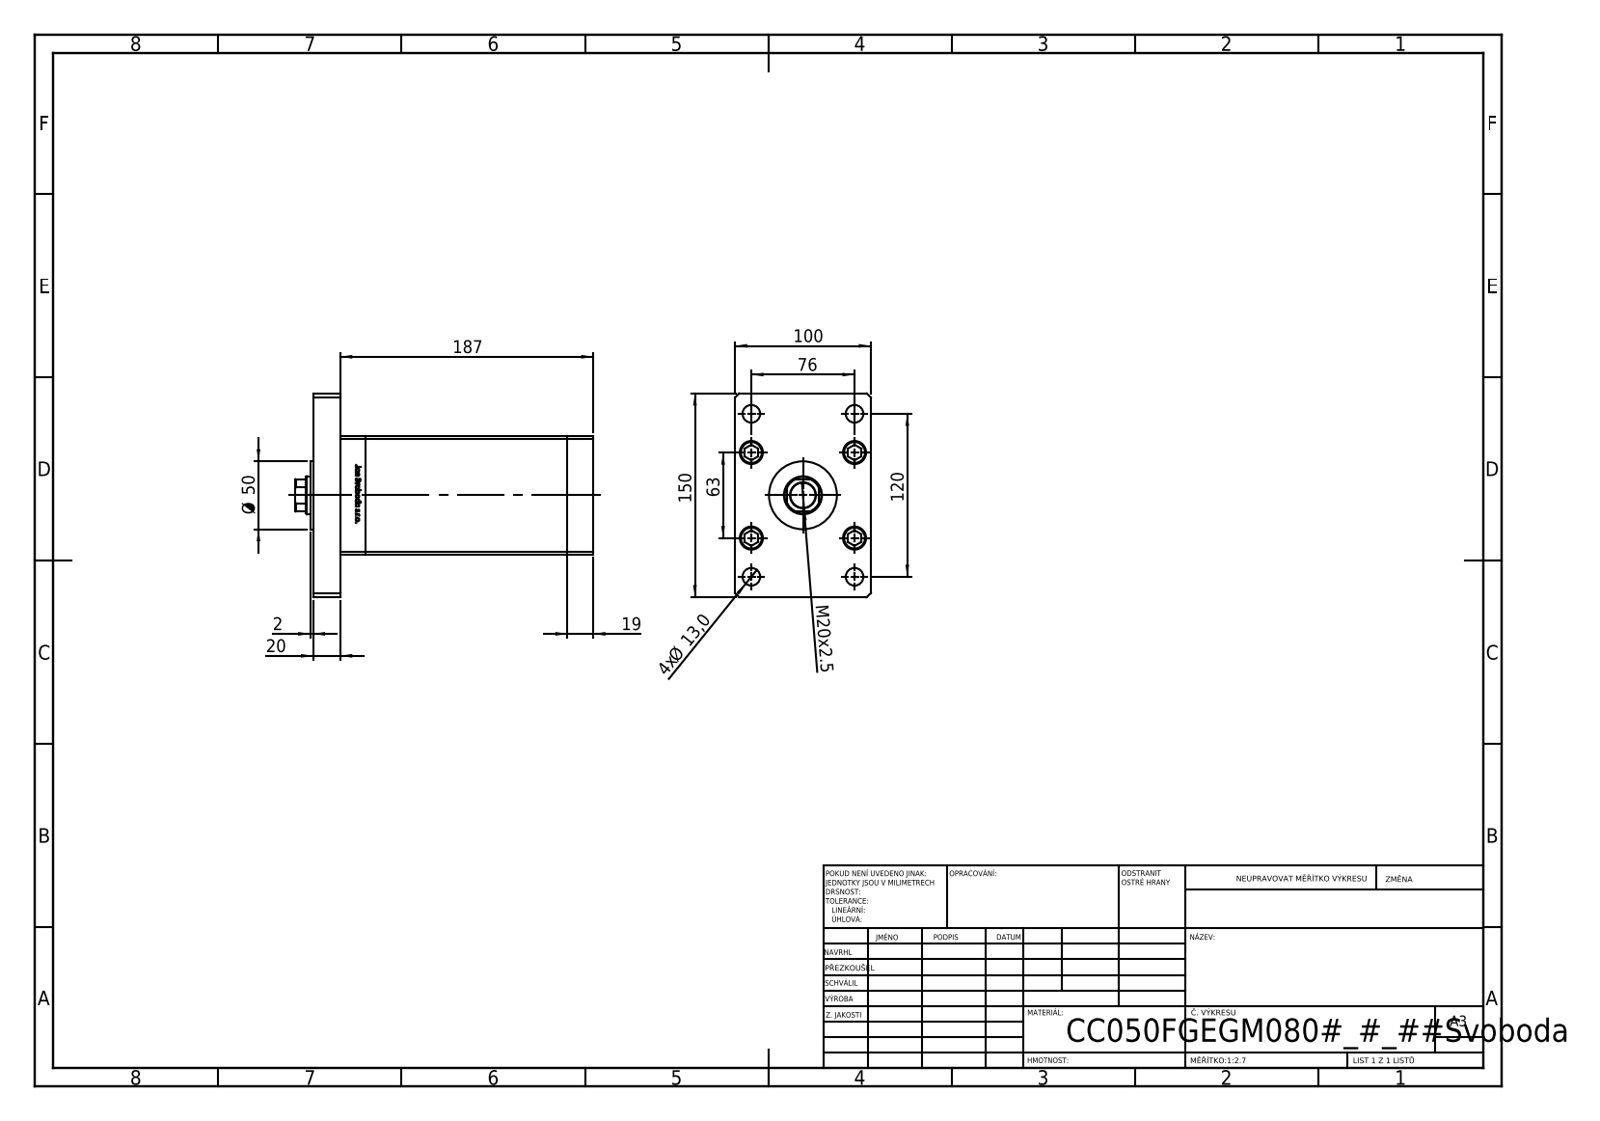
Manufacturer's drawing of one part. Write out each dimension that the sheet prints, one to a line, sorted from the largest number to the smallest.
187
150
120
100
76
63
Ø 50
20
M20x2.5
19
4x Ø 13,0
2
